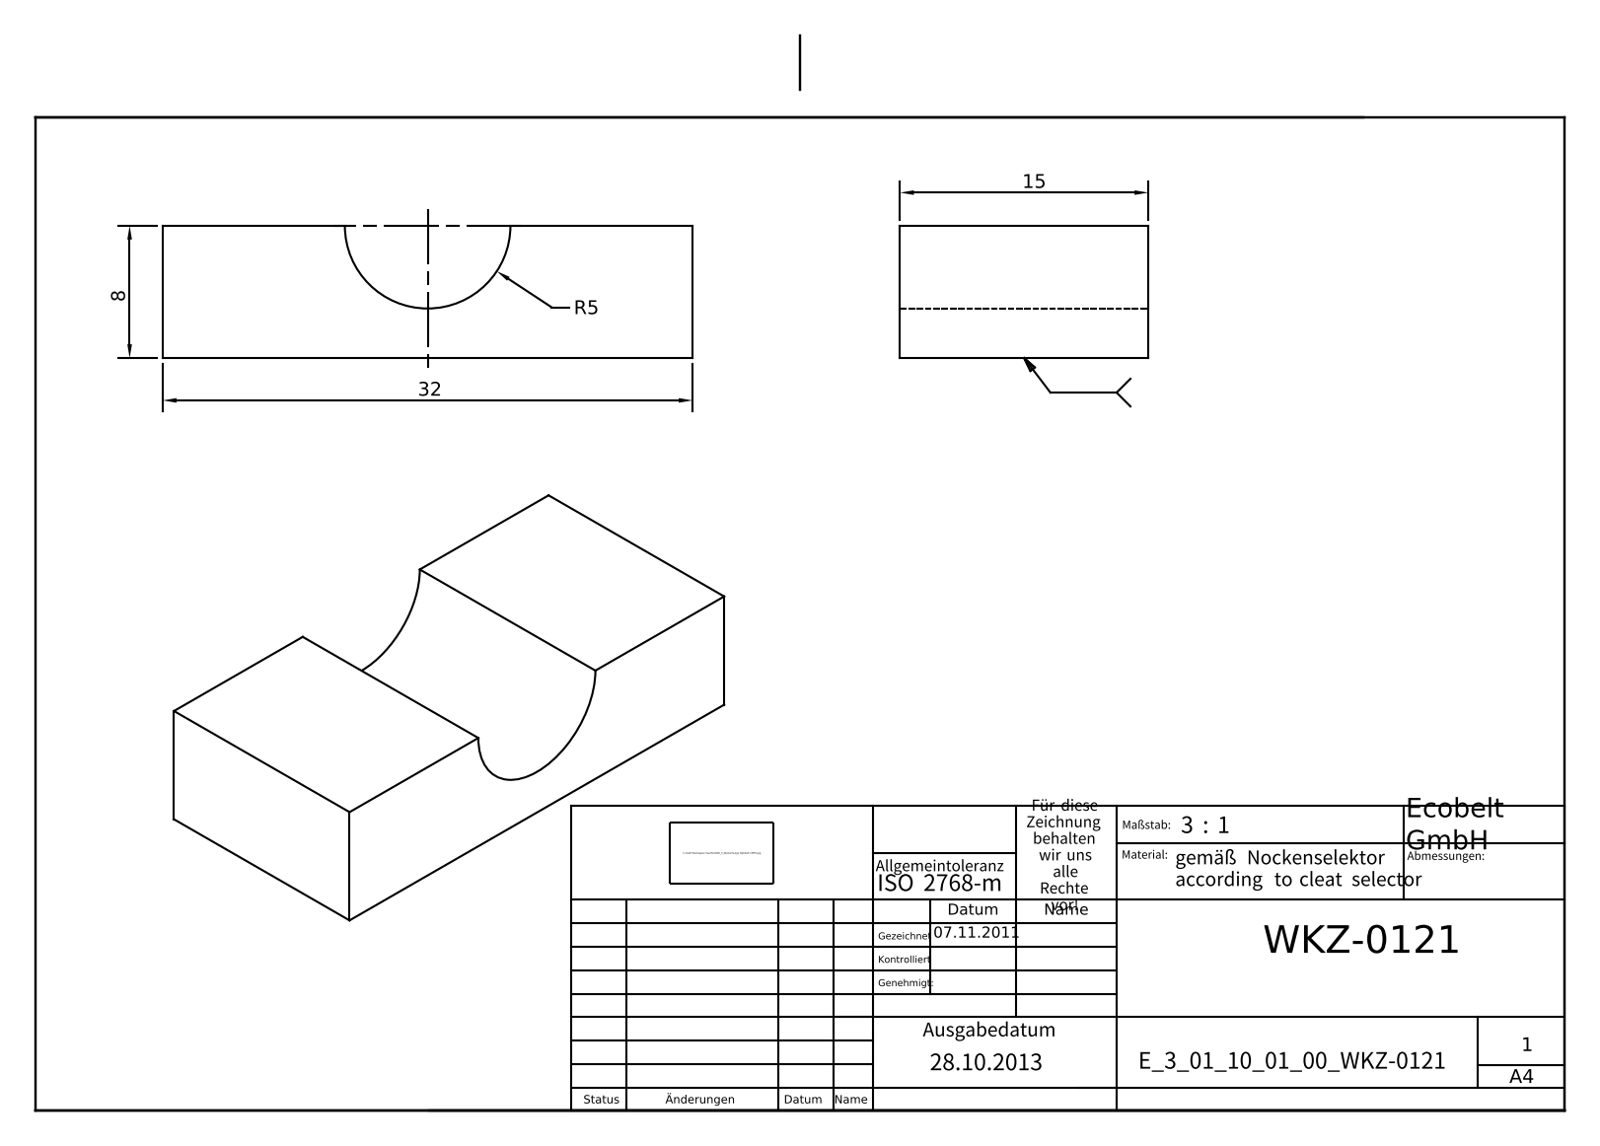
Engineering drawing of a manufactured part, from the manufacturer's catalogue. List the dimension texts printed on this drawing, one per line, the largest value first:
32
15
8
R5
